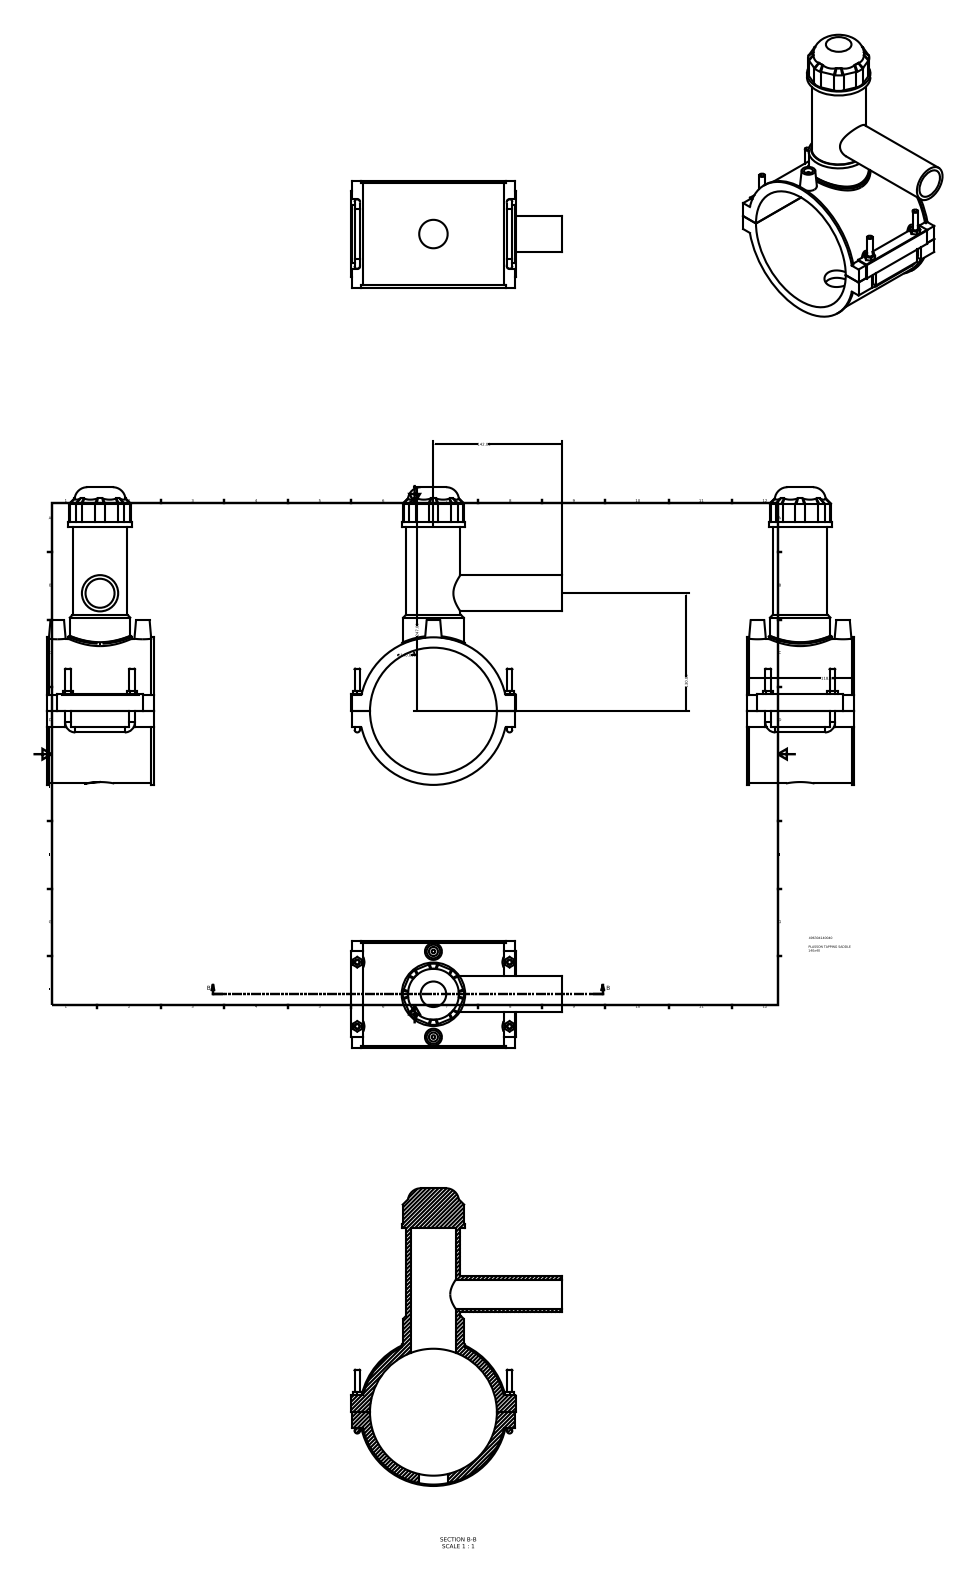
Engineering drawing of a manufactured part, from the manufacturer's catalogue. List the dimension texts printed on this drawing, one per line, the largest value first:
247.00
142.00
∅140.00
130.00
118.00
